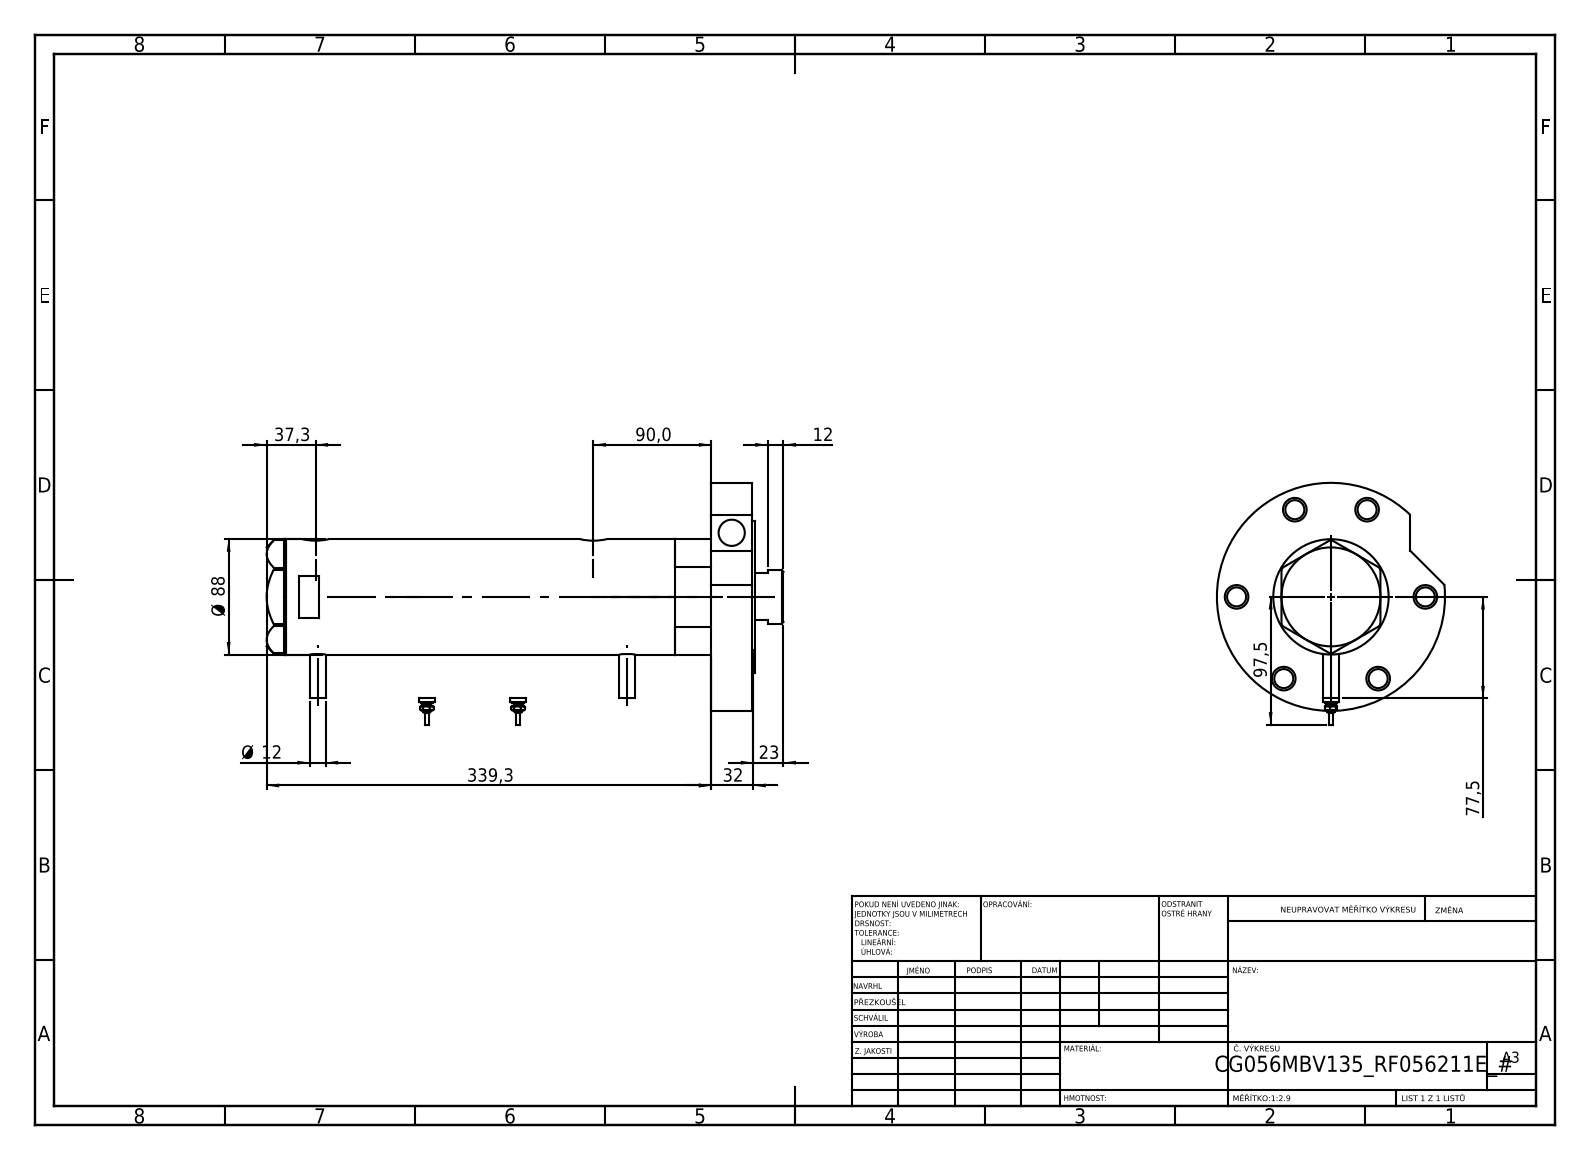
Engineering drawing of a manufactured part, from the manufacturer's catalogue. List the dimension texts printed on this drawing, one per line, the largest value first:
339,3
97,5
90,0
Ø 88
77,5
37,3
32
23
12
Ø 12
